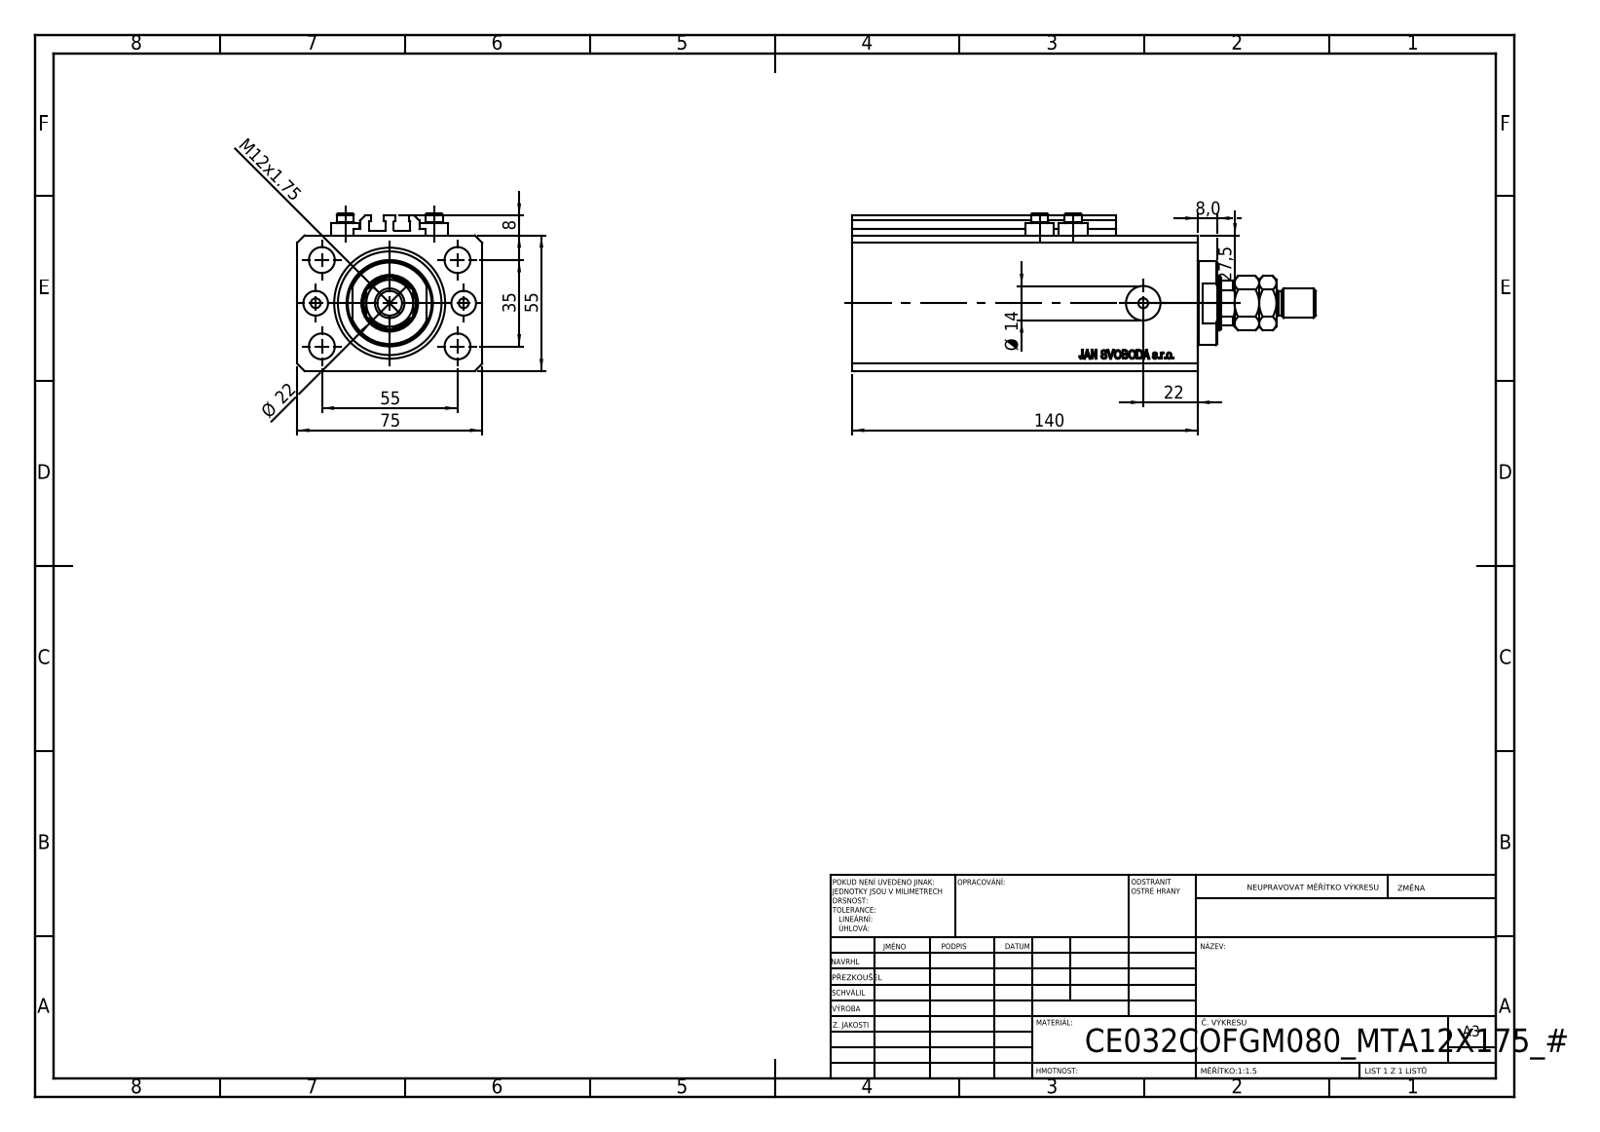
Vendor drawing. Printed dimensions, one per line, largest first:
140
75
55
55
35
27,5
Ø 22
22
Ø 14
M12x1.75
8
8,0
